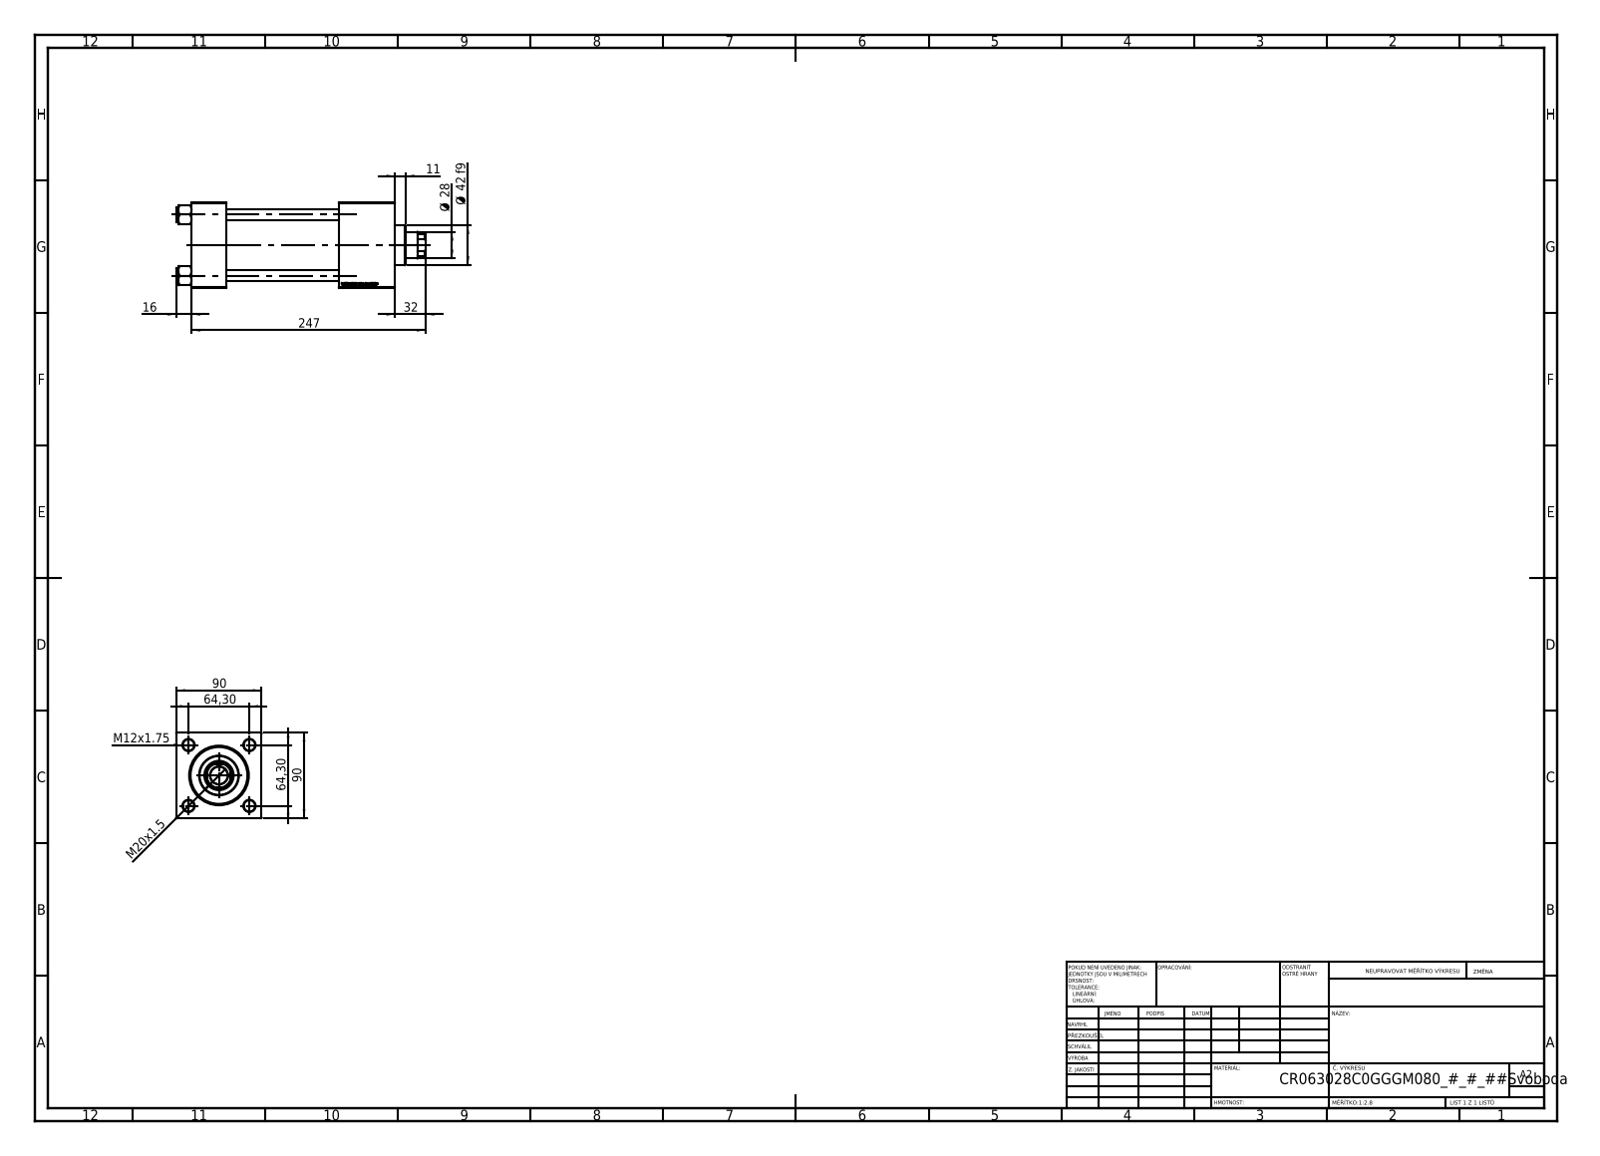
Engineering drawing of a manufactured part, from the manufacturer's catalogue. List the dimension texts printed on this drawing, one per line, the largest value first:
247
90
90
64,30
64,30
Ø 42 f9
32
Ø 28
M20x1.5
16
M12x1.75
11
